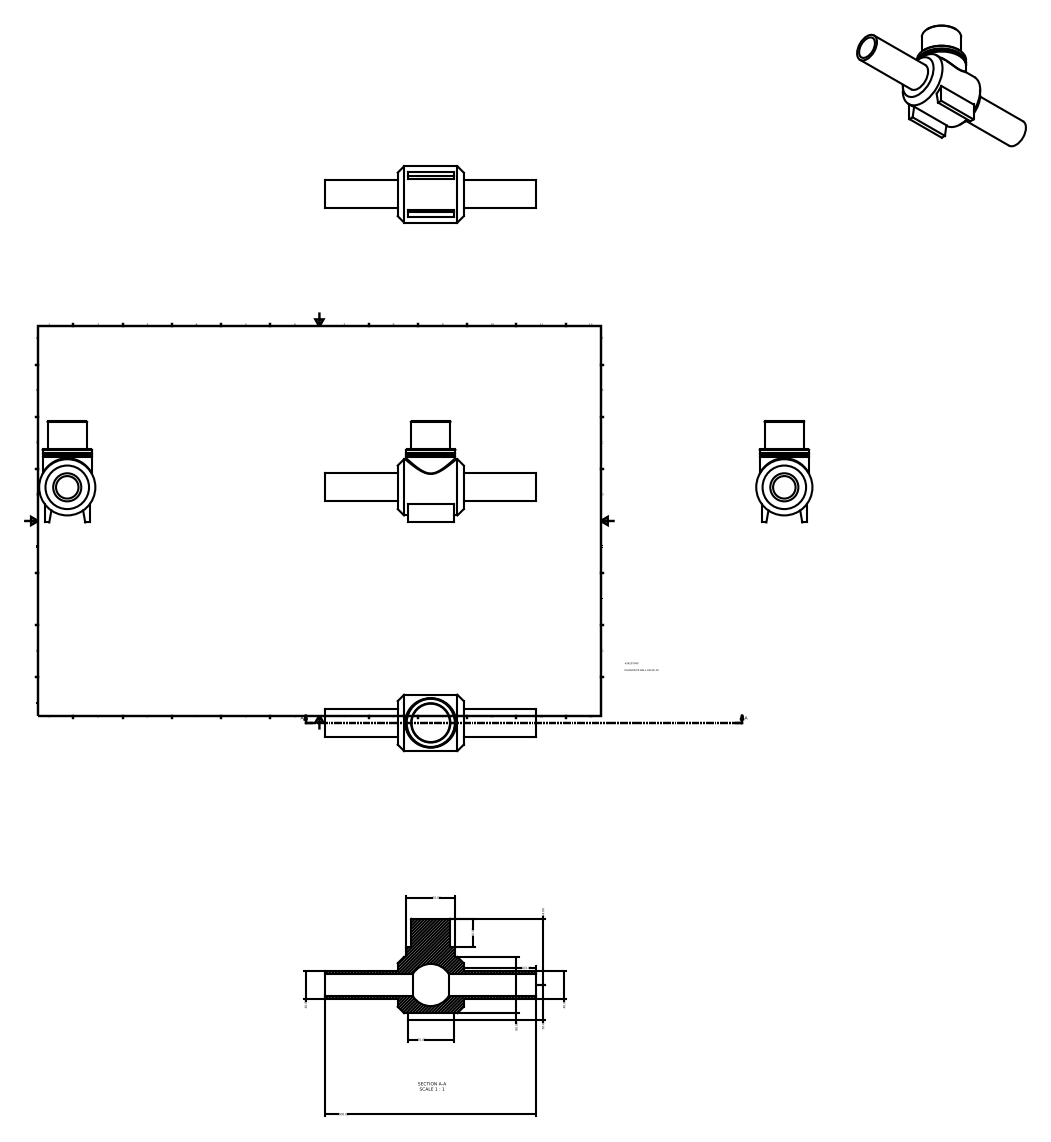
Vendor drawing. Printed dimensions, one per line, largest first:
300.00
103.00
94.00
80.00
70.00
65.00
50.00
40.00
40.00
40.00
